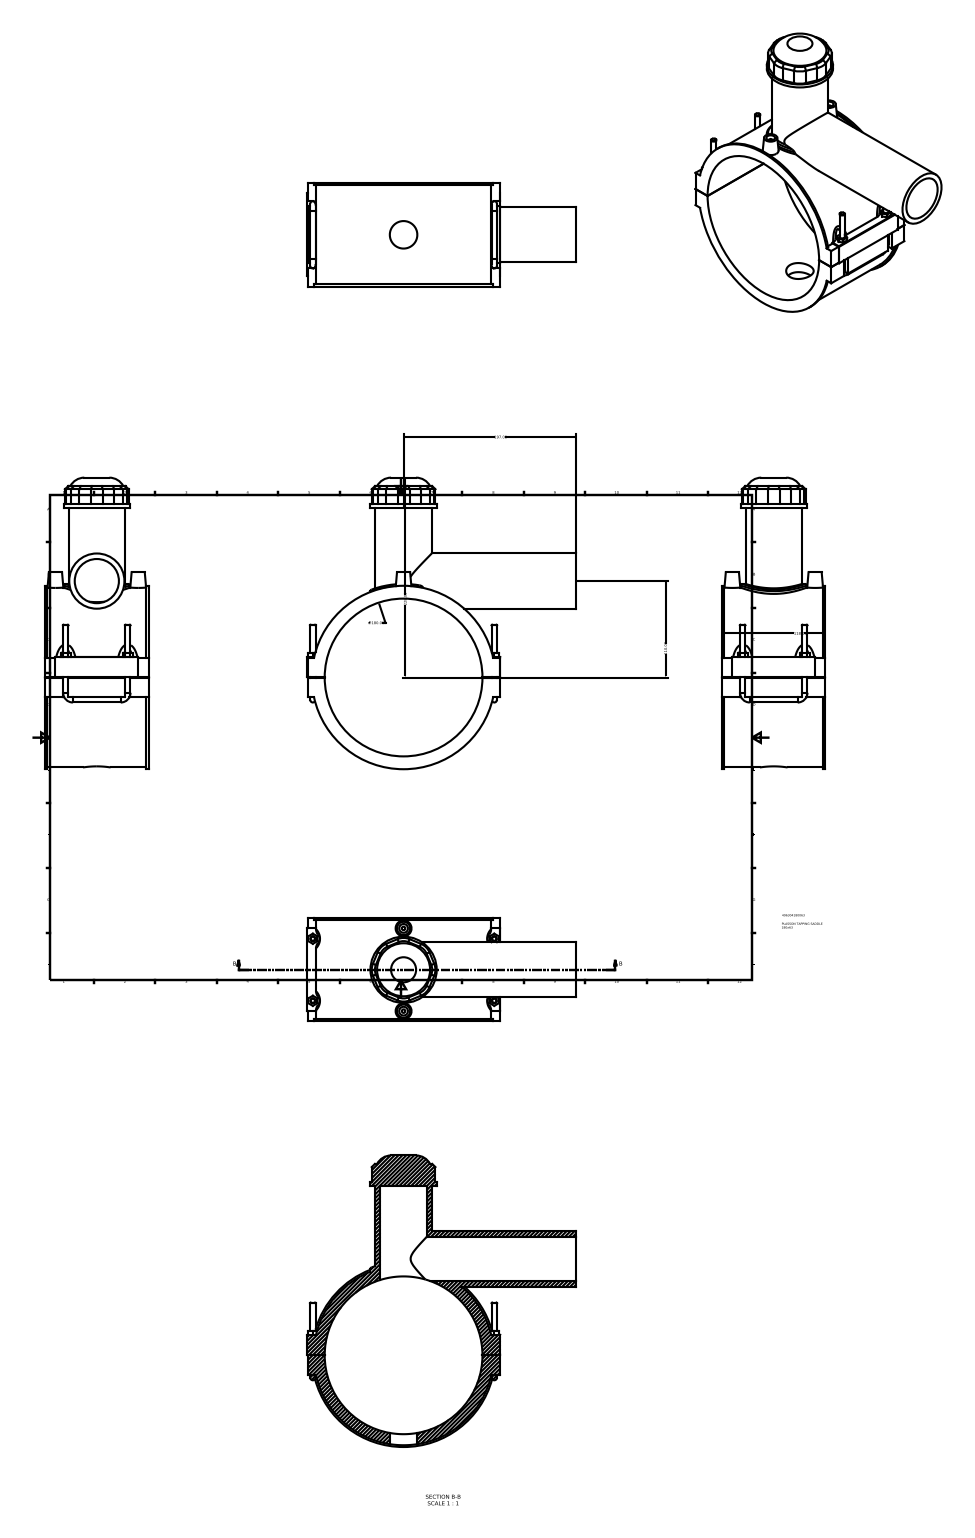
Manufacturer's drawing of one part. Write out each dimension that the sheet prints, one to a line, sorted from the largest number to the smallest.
228.00
197.00
∅180.00
118.00
110.00
